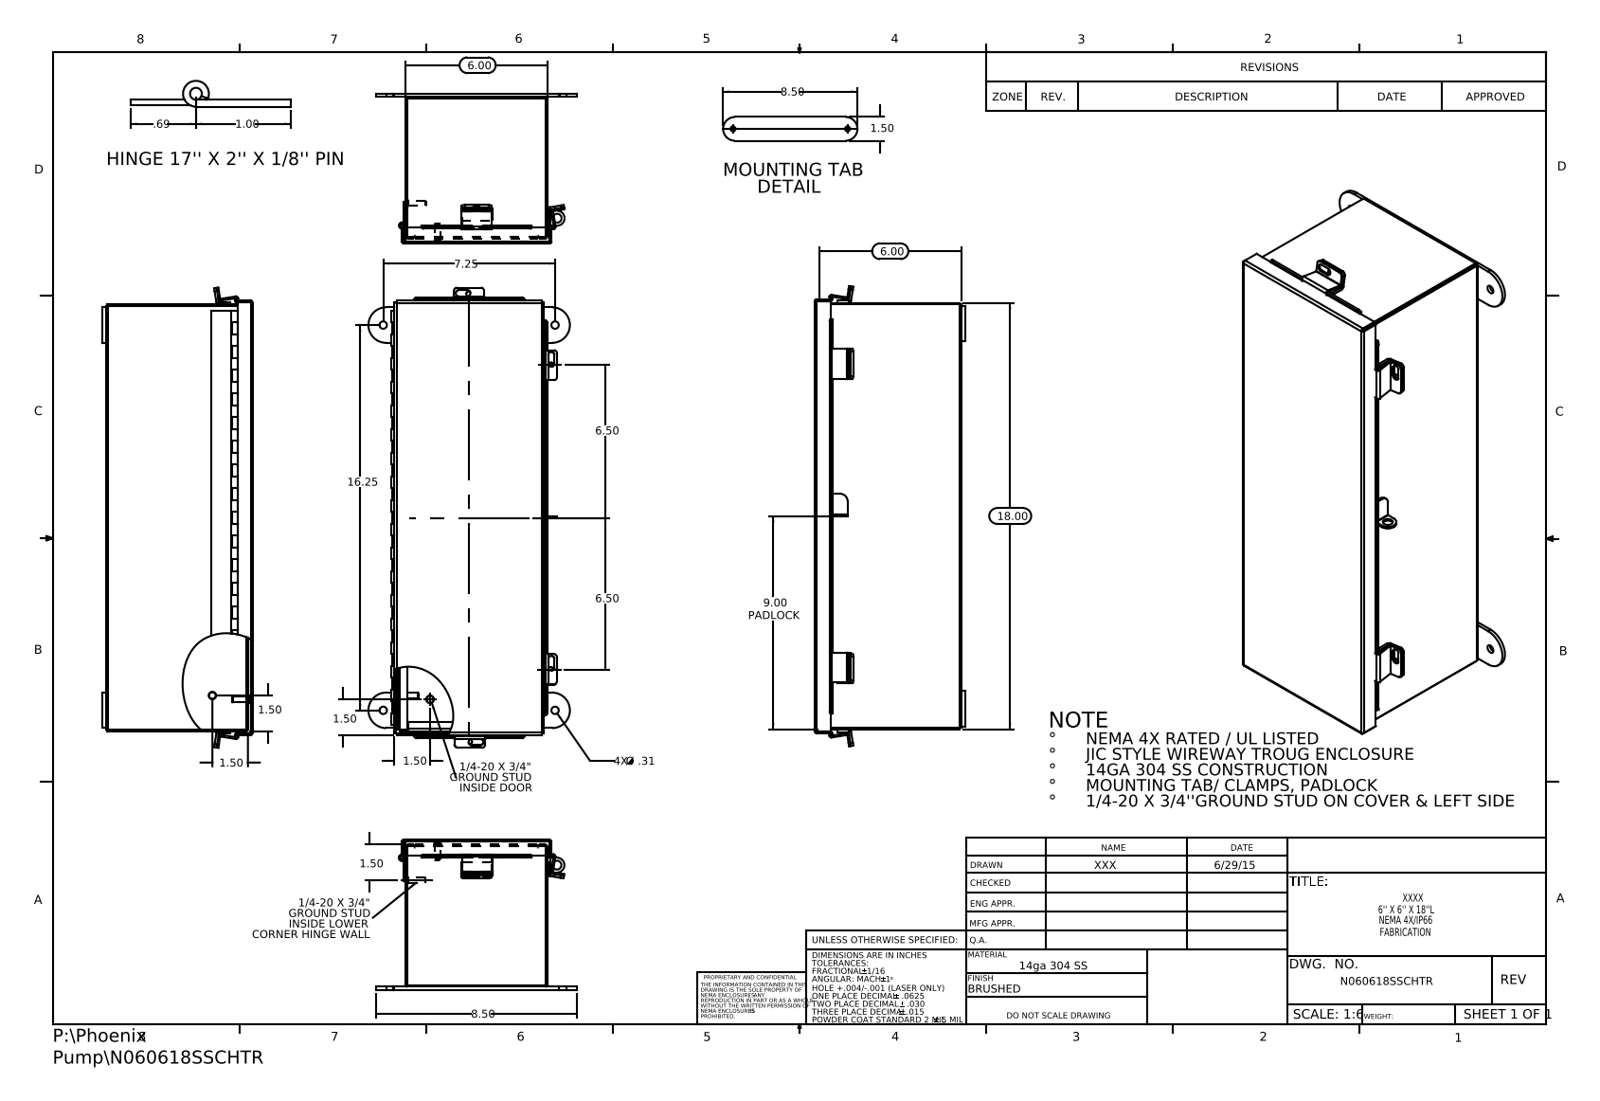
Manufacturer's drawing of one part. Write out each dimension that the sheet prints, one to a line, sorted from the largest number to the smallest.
18.00
16.25
9.00 PADLOCK
8.50
8.50
7.25
6.50
6.50
6.00
6.00
1.50
1.50
1.50
1.50
1.50
1.50
1.00
.69
4X Ø .31
